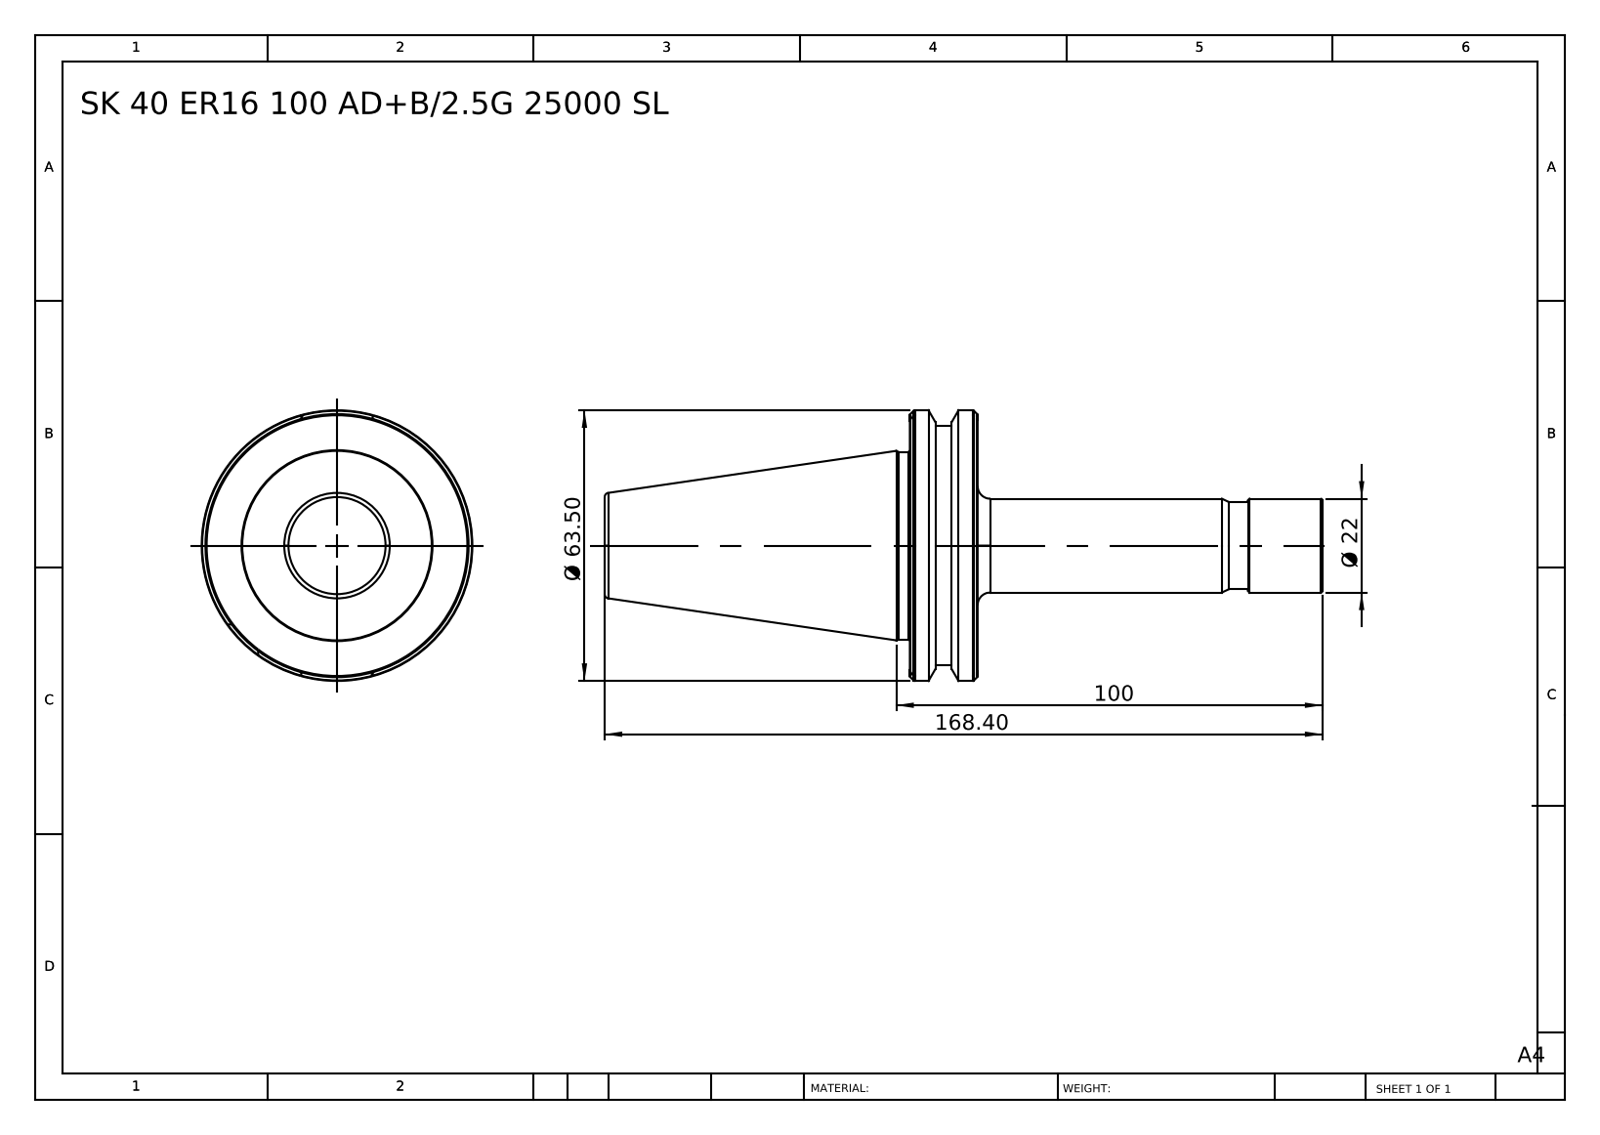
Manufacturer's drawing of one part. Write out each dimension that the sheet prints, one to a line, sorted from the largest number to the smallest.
168.40
100
Ø 63.50
Ø 22
